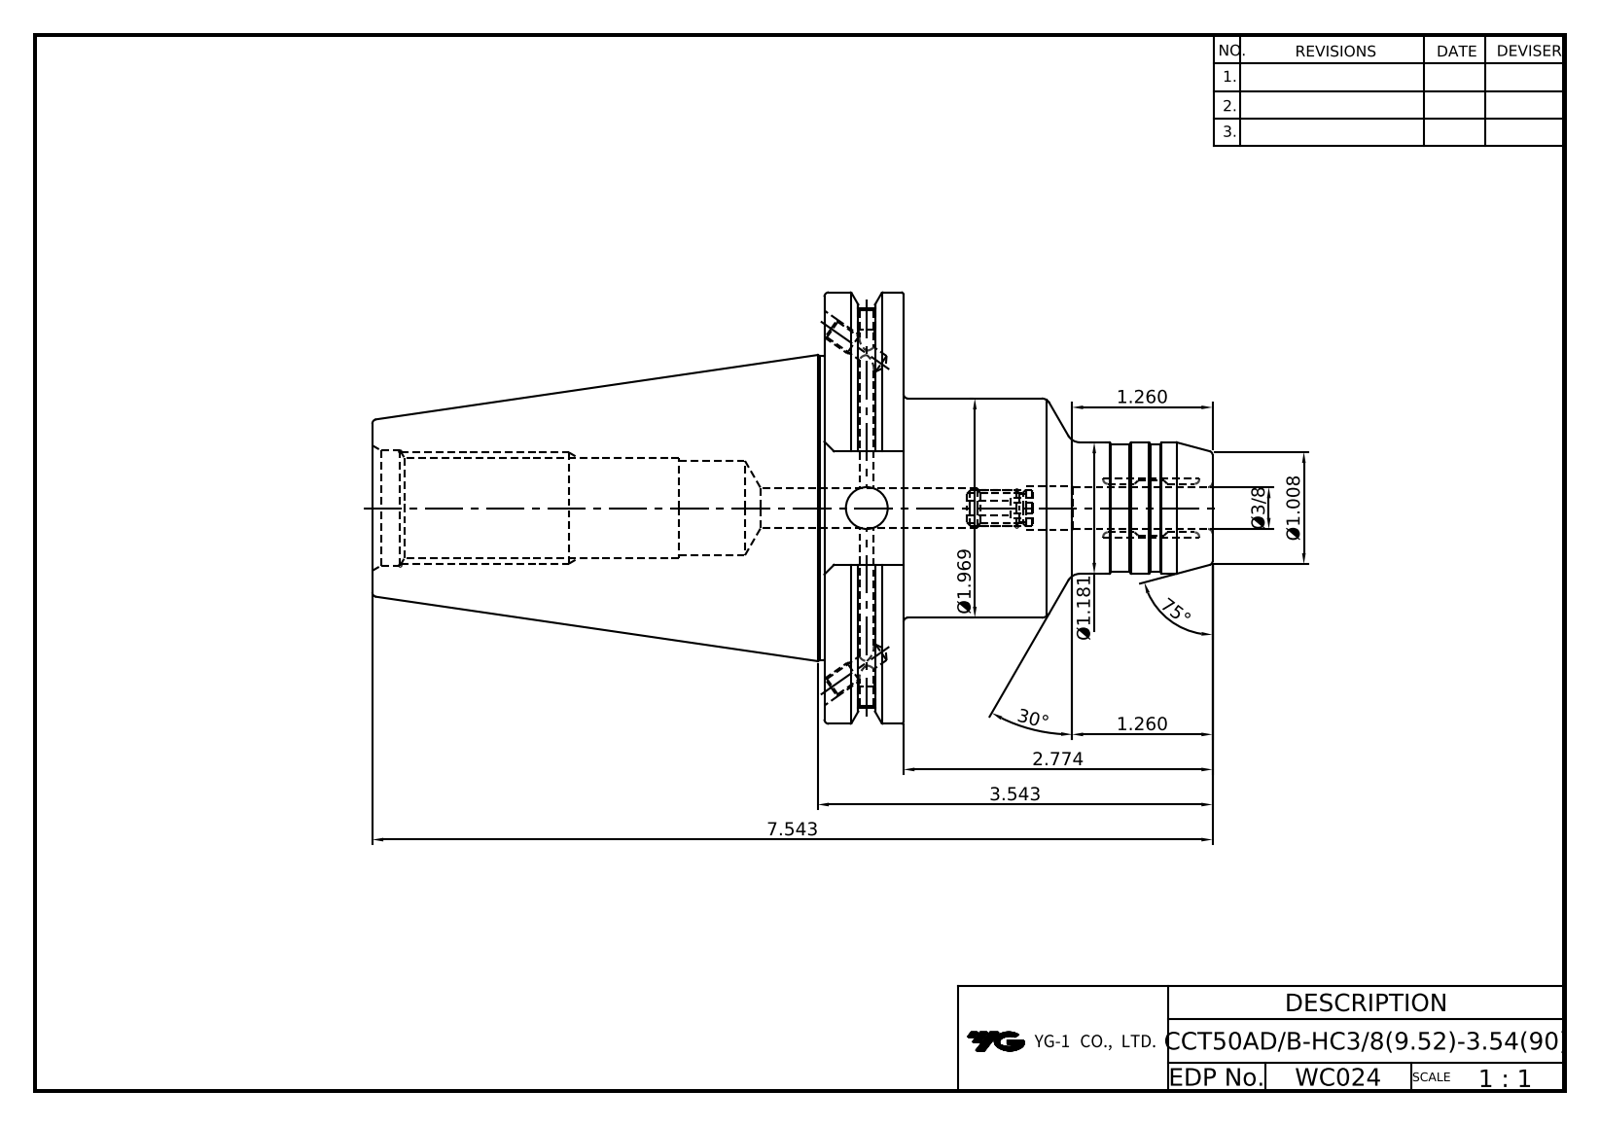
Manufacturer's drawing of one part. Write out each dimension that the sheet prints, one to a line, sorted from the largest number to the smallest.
75°
30°
7.543
3.543
2.774
Ø1.969
1.260
1.260
Ø1.181
Ø1.008
Ø3/8
